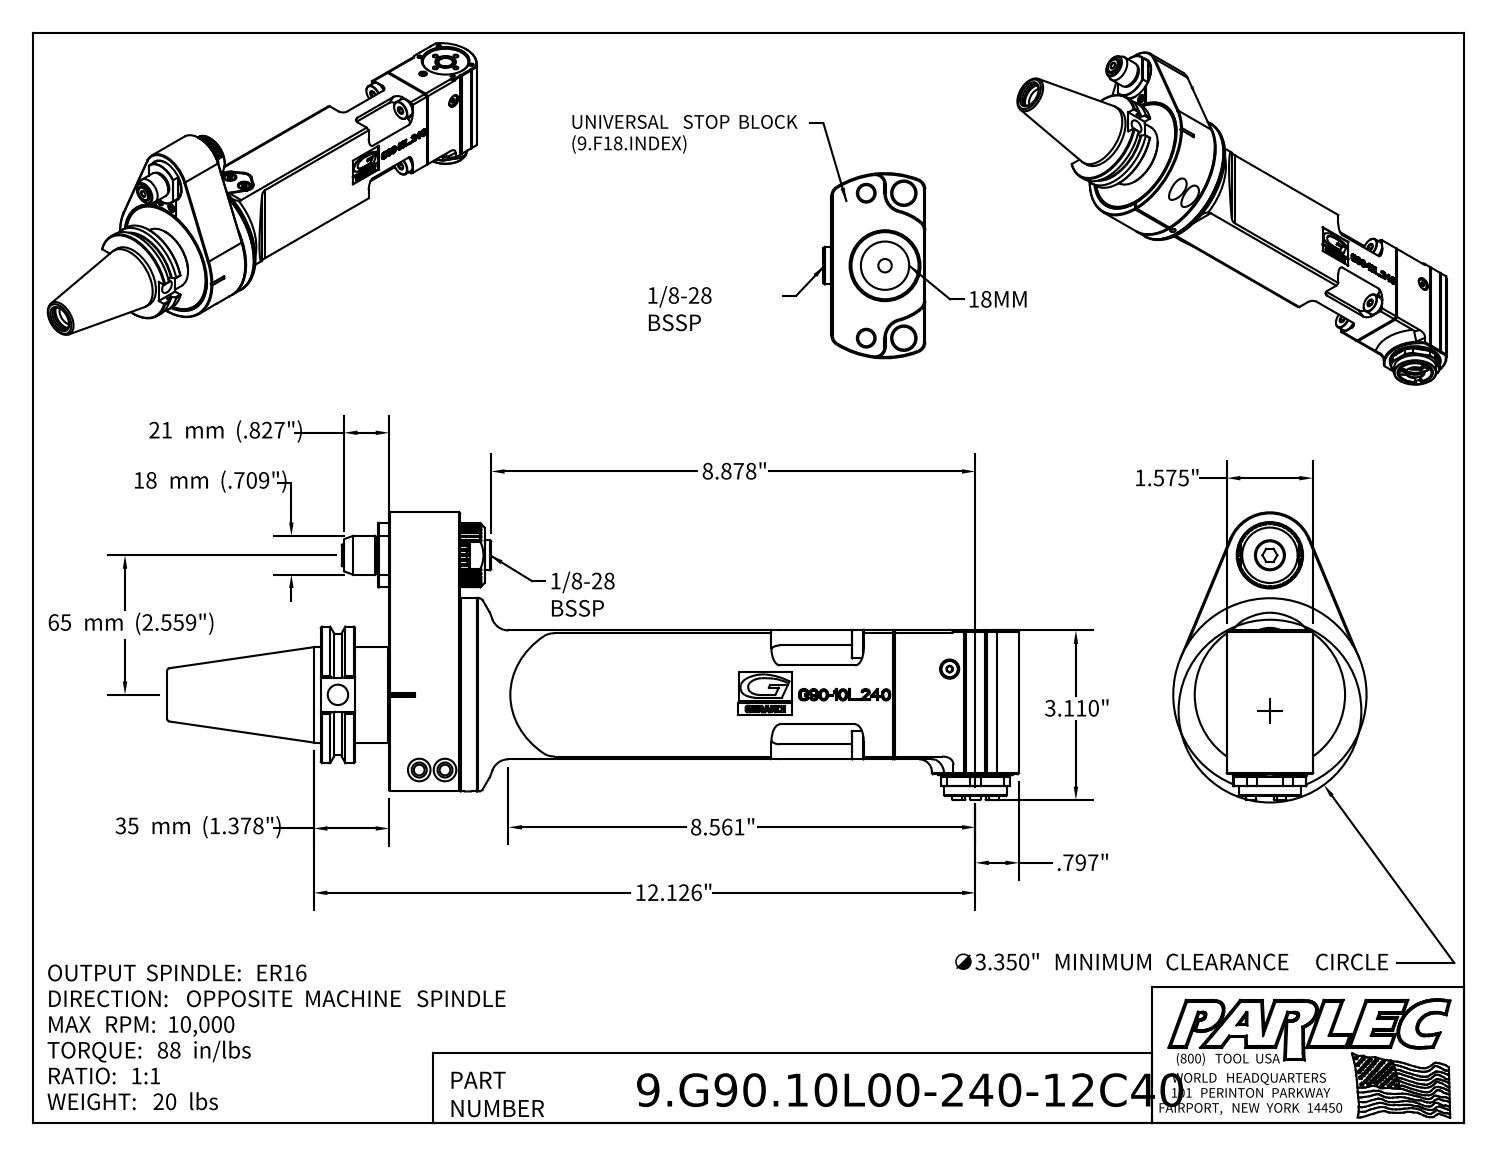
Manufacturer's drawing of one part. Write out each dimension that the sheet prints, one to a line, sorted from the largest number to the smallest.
65 mm (2.559")
35 mm (1.378")
21 mm (.827")
18 mm (.709")
12.126"
8.878"
8.561"
∅3.350" MINIMUM CLEARANCE CIRCLE
3.110"
1.575"
.797"
